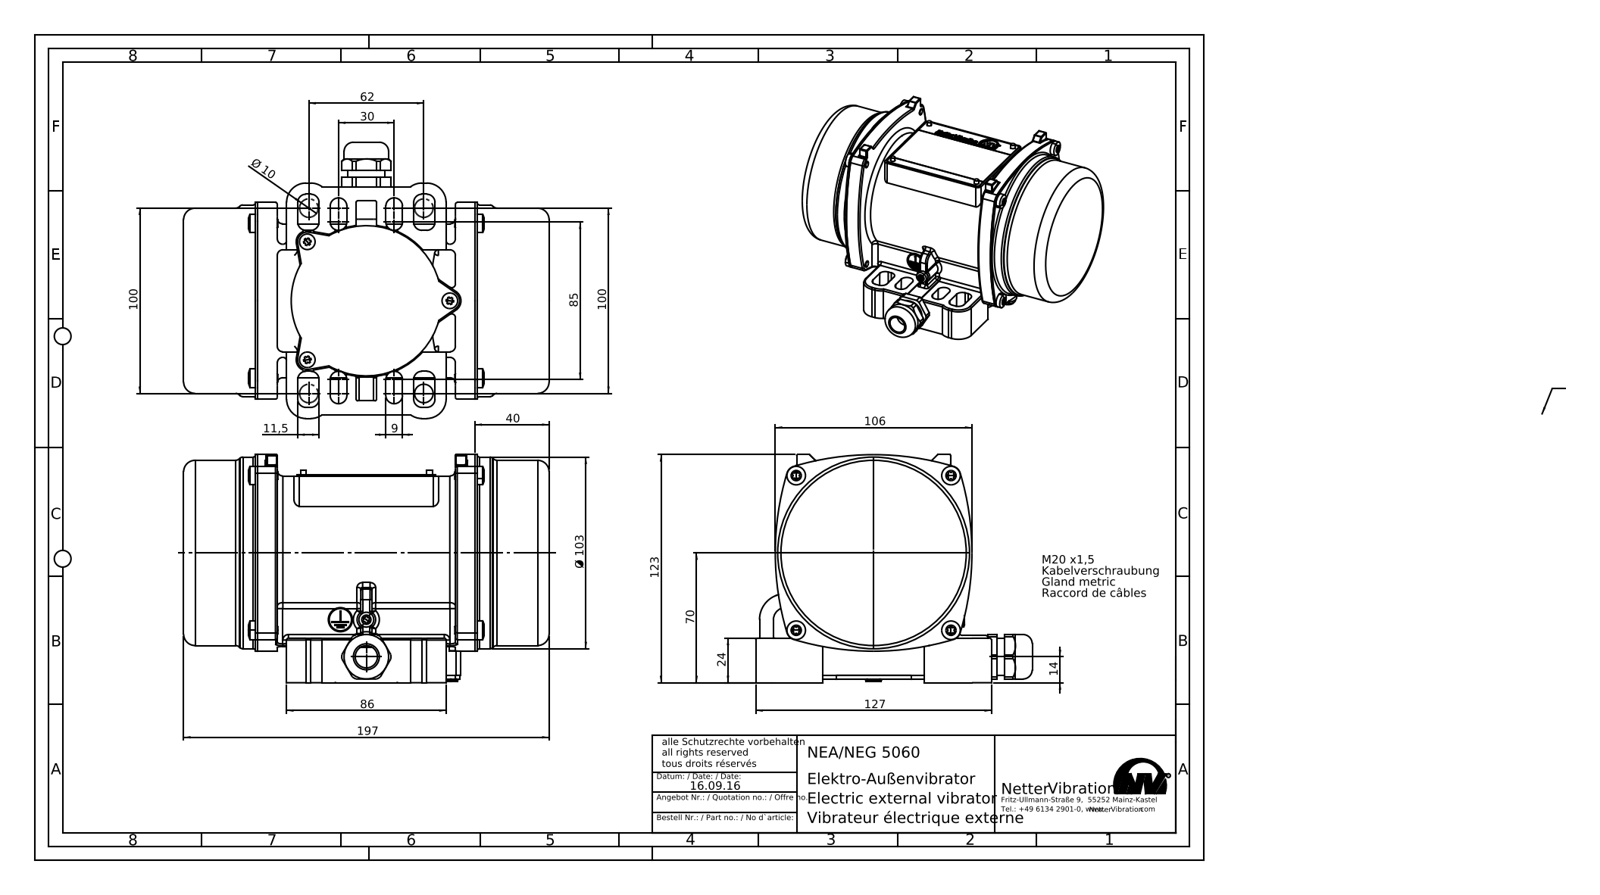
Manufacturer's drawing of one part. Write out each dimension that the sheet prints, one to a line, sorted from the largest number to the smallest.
197
127
123
106
Ø 103
100
100
86
85
70
62
40
30
24
14
11,5
Ø 10
9
